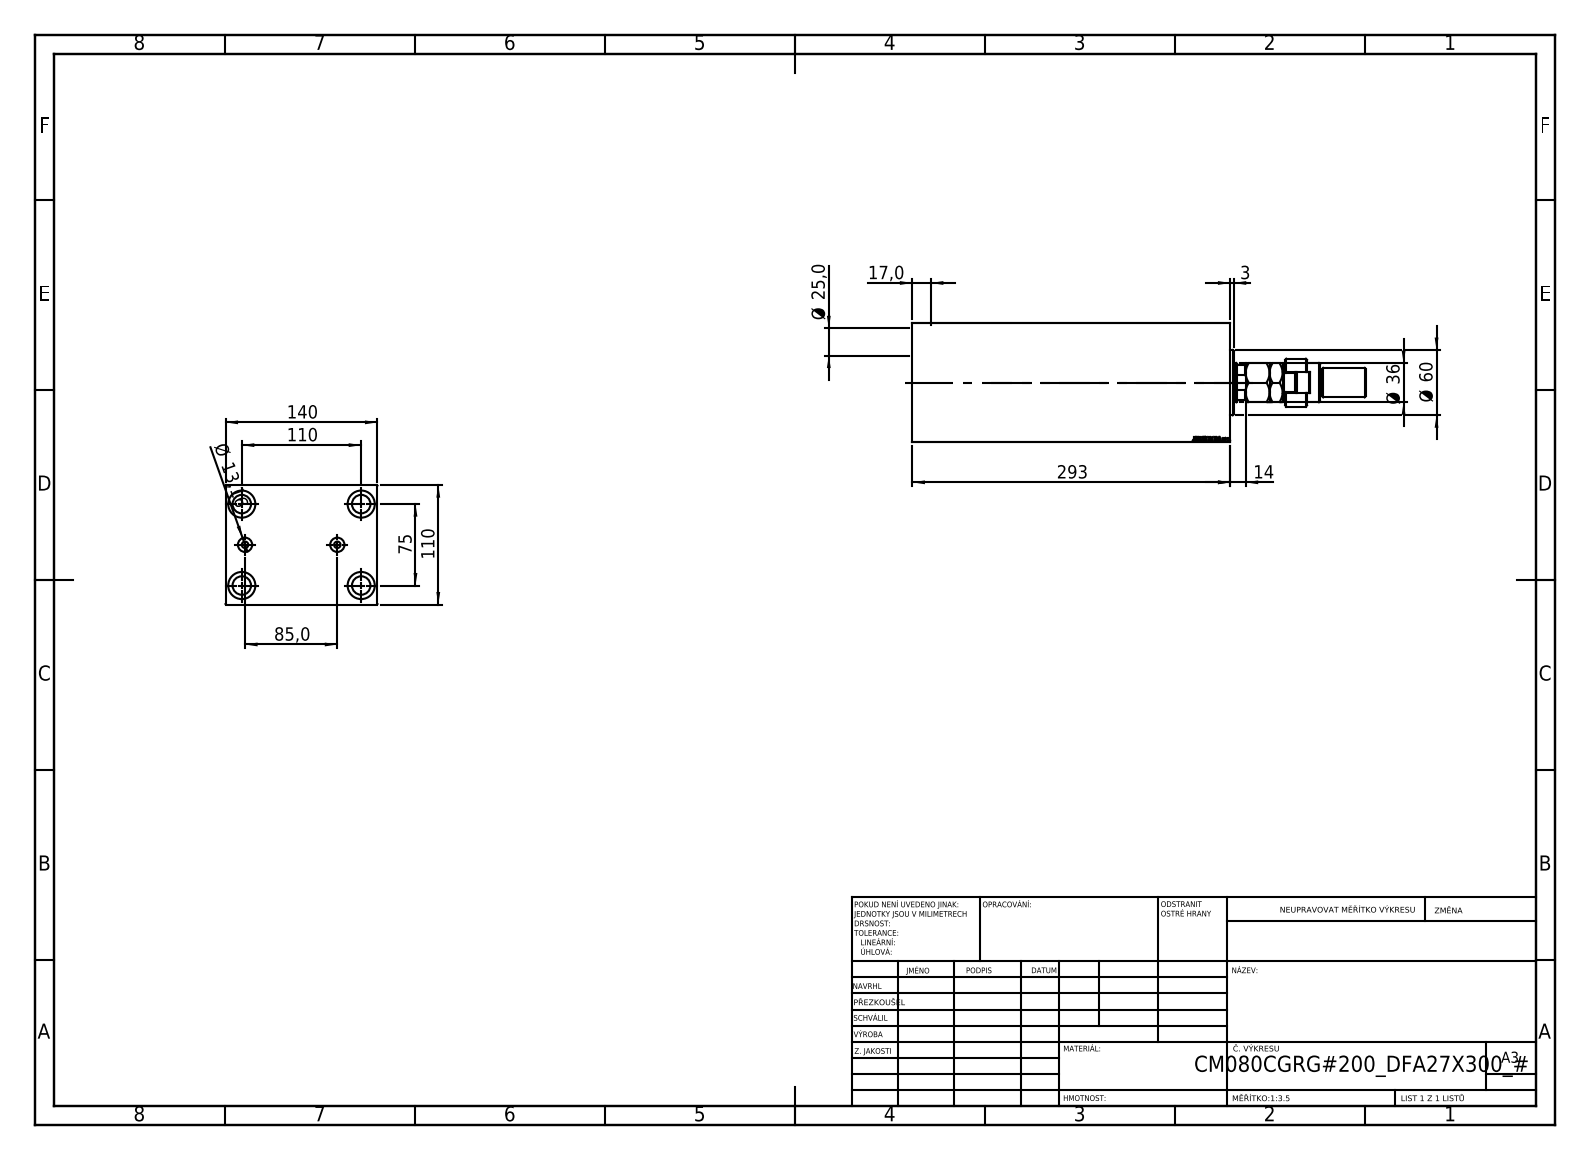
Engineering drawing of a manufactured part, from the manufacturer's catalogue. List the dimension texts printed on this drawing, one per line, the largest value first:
293
140
110
110
85,0
75
Ø 60
Ø 36
Ø 25,0
17,0
14
Ø 13,16
3
